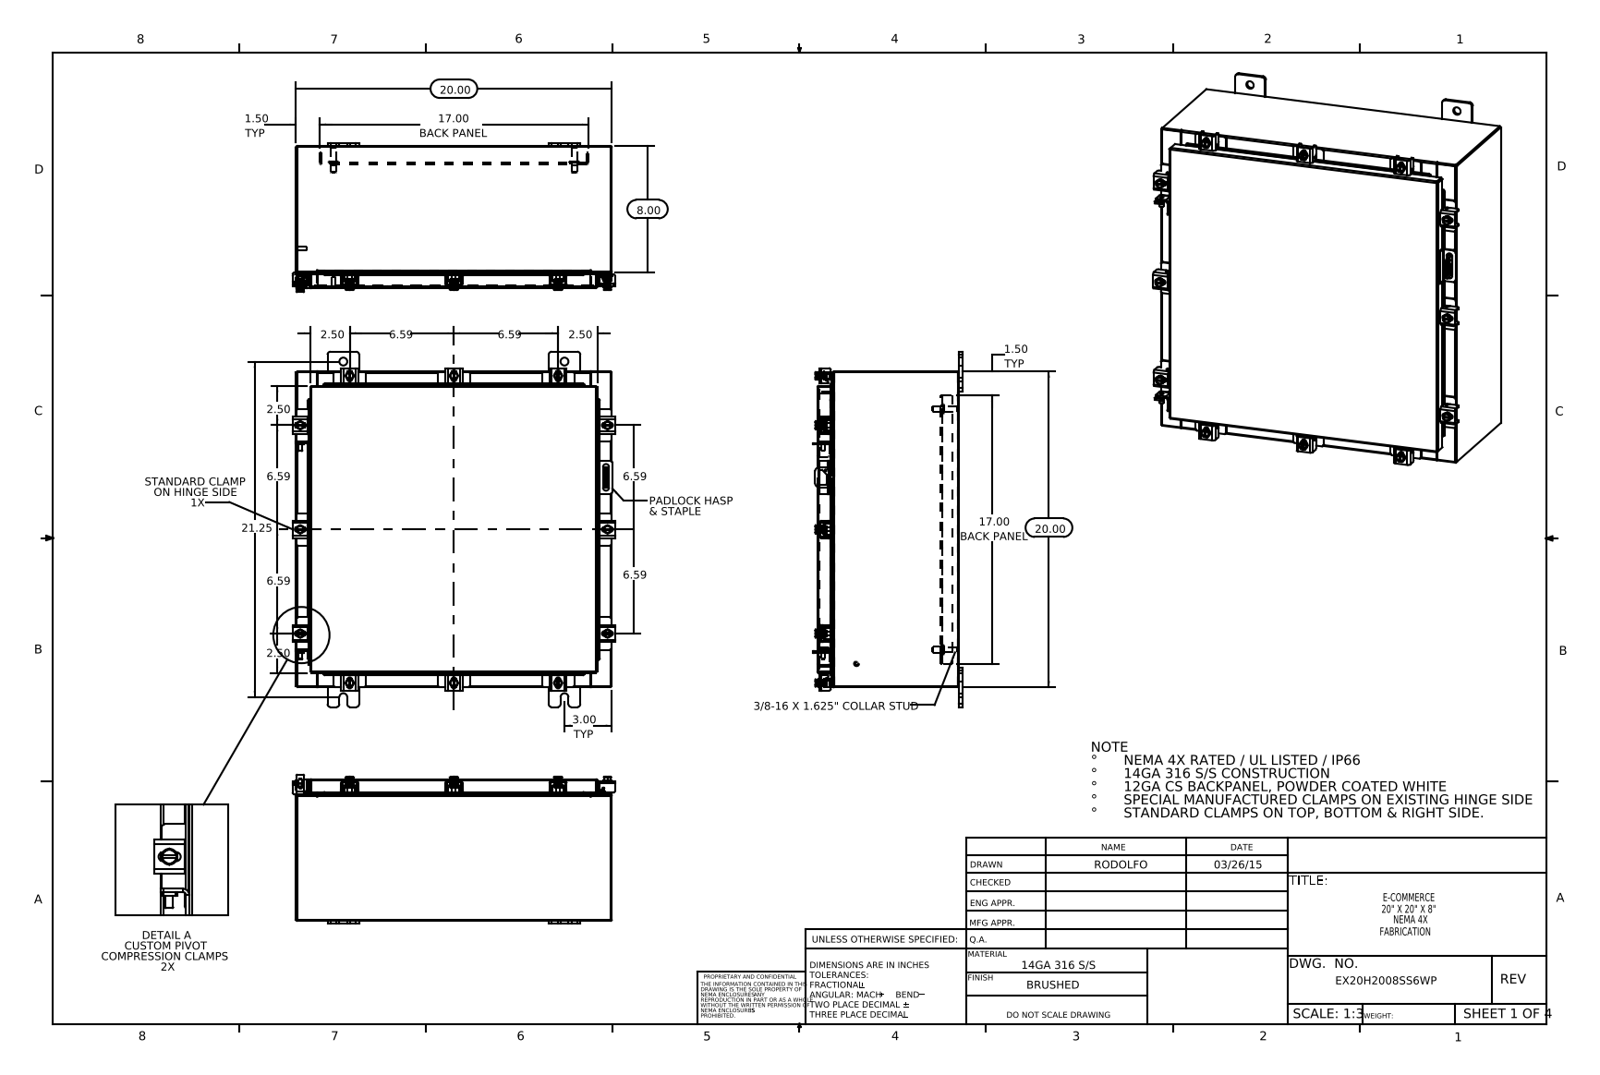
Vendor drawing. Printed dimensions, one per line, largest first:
21.25
20.00
20.00
17.00 BACK PANEL
17.00 BACK PANEL
8.00
6.59
6.59
6.59
6.59
6.59
6.59
3.00 TYP
2.50
2.50
2.50
2.50
1.50 TYP
1.50 TYP
